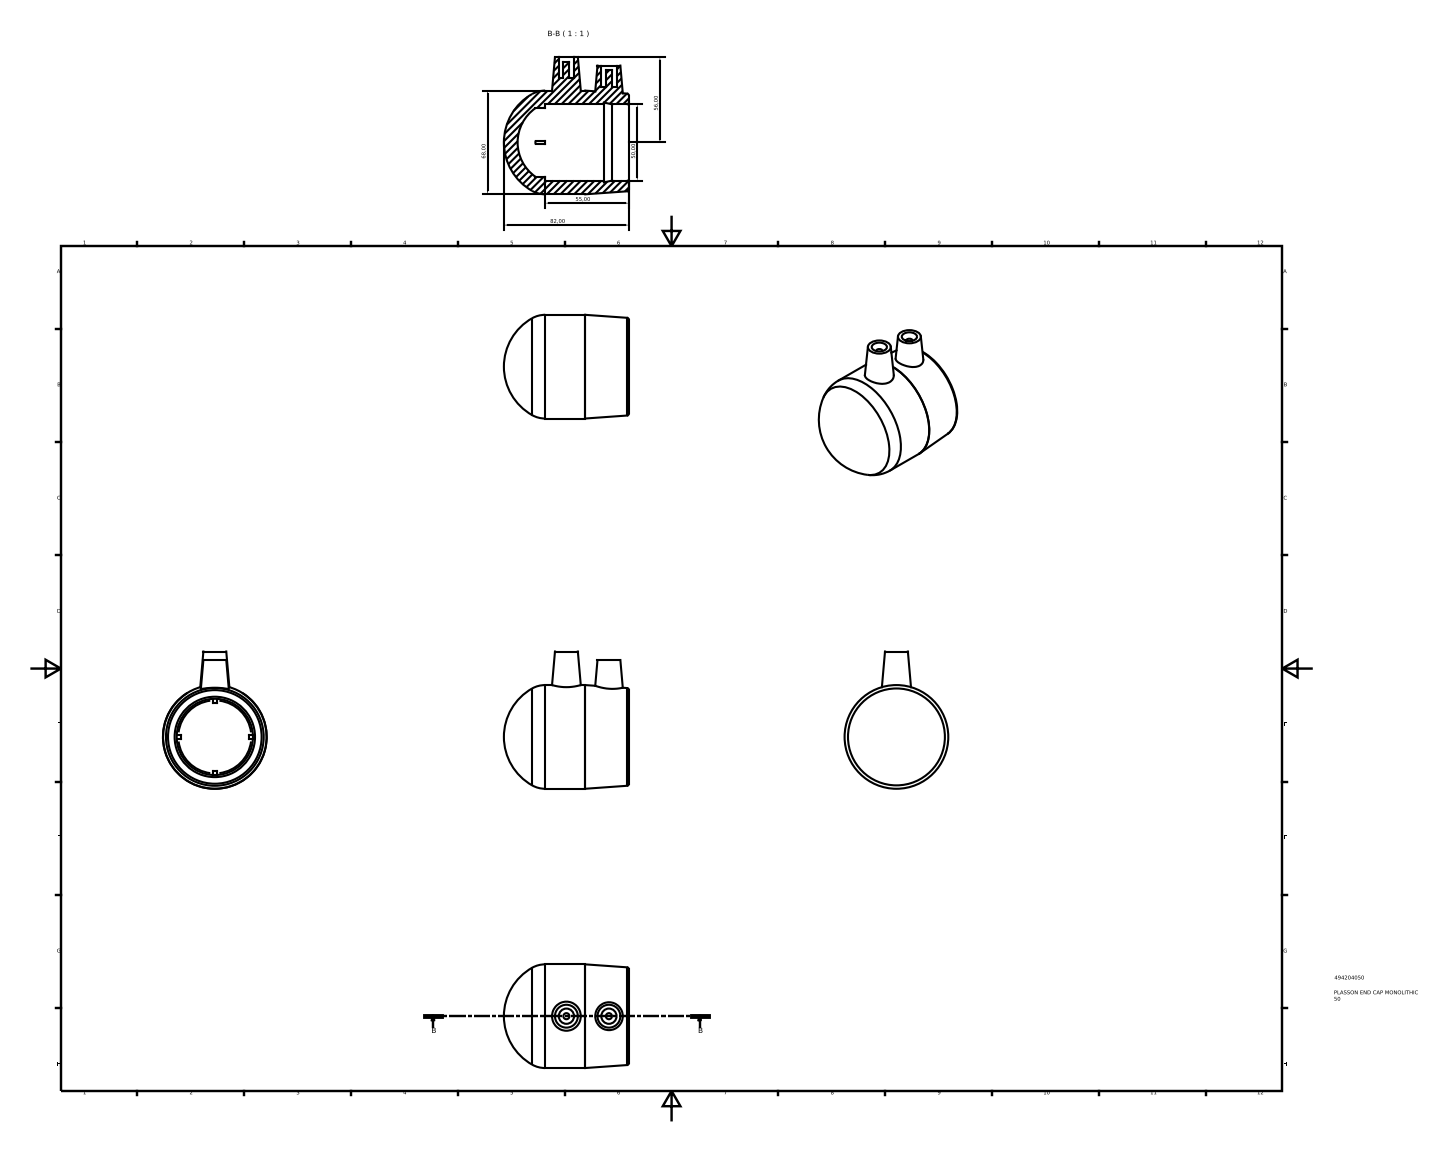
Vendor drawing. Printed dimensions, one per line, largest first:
82,00
68,00
56,00
55,00
50,00
